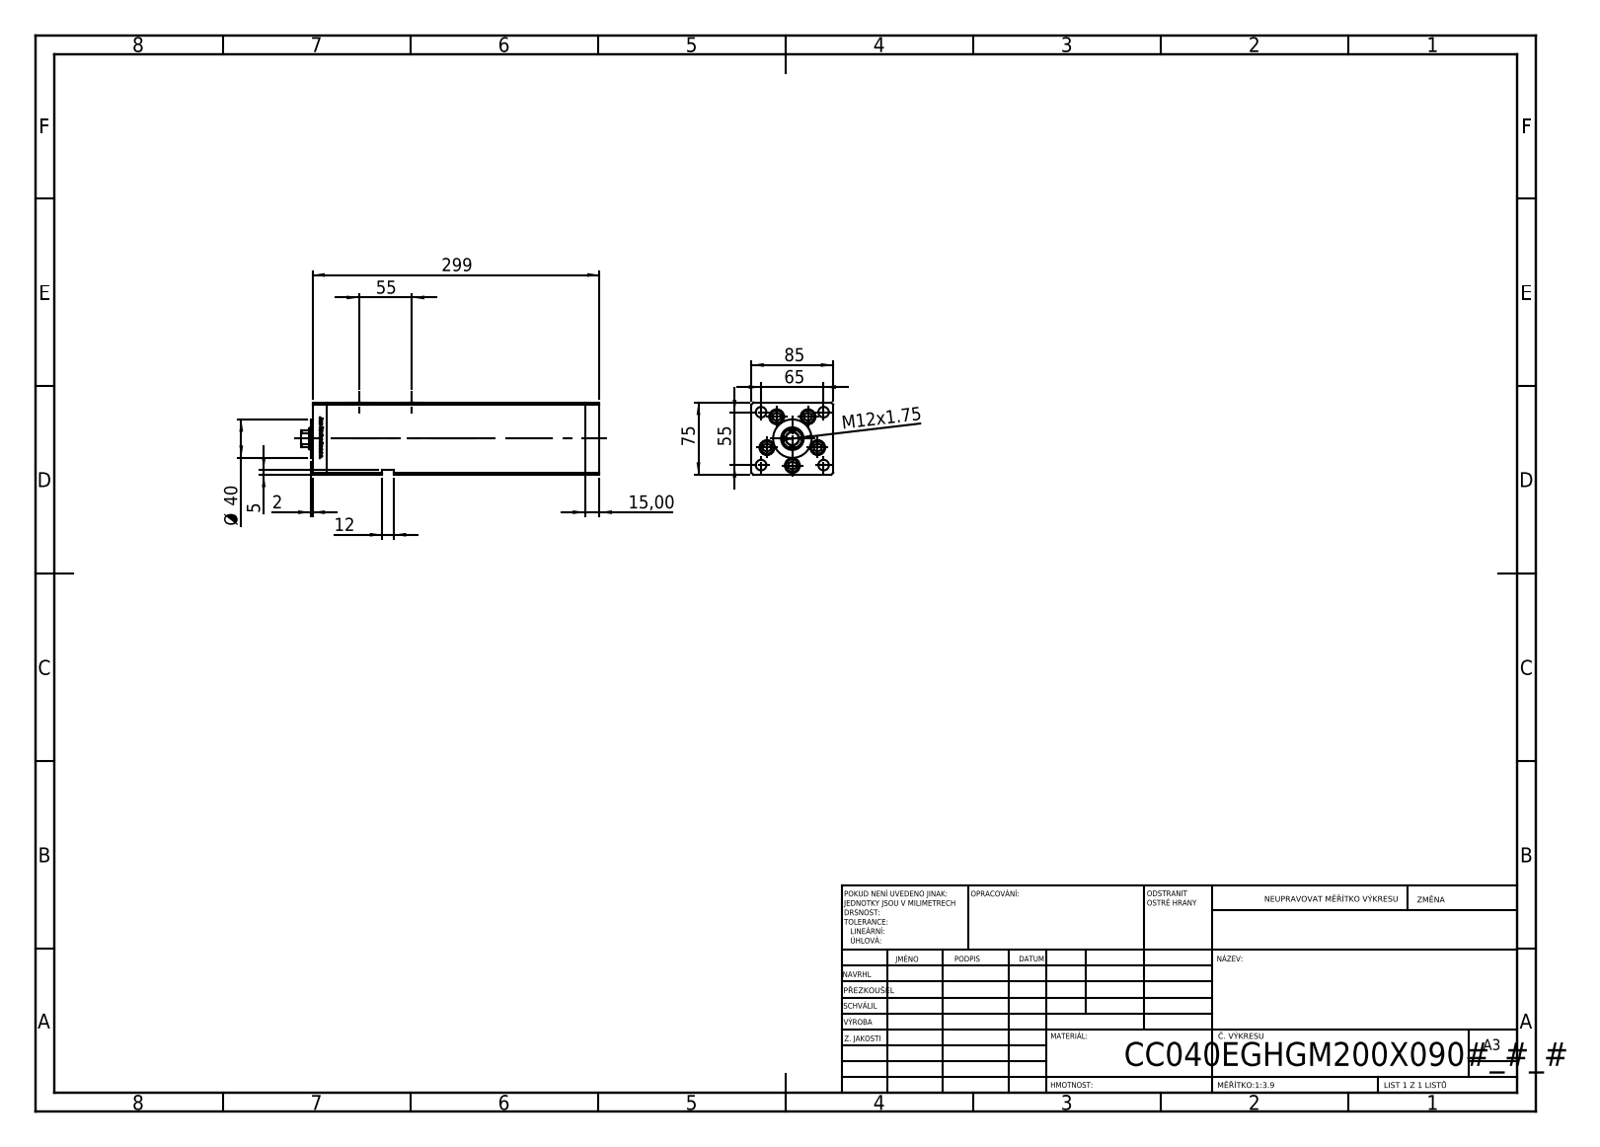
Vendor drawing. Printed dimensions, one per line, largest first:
299
85
75
65
55
55
Ø 40
15,00
12
M12x1.75
5
2
